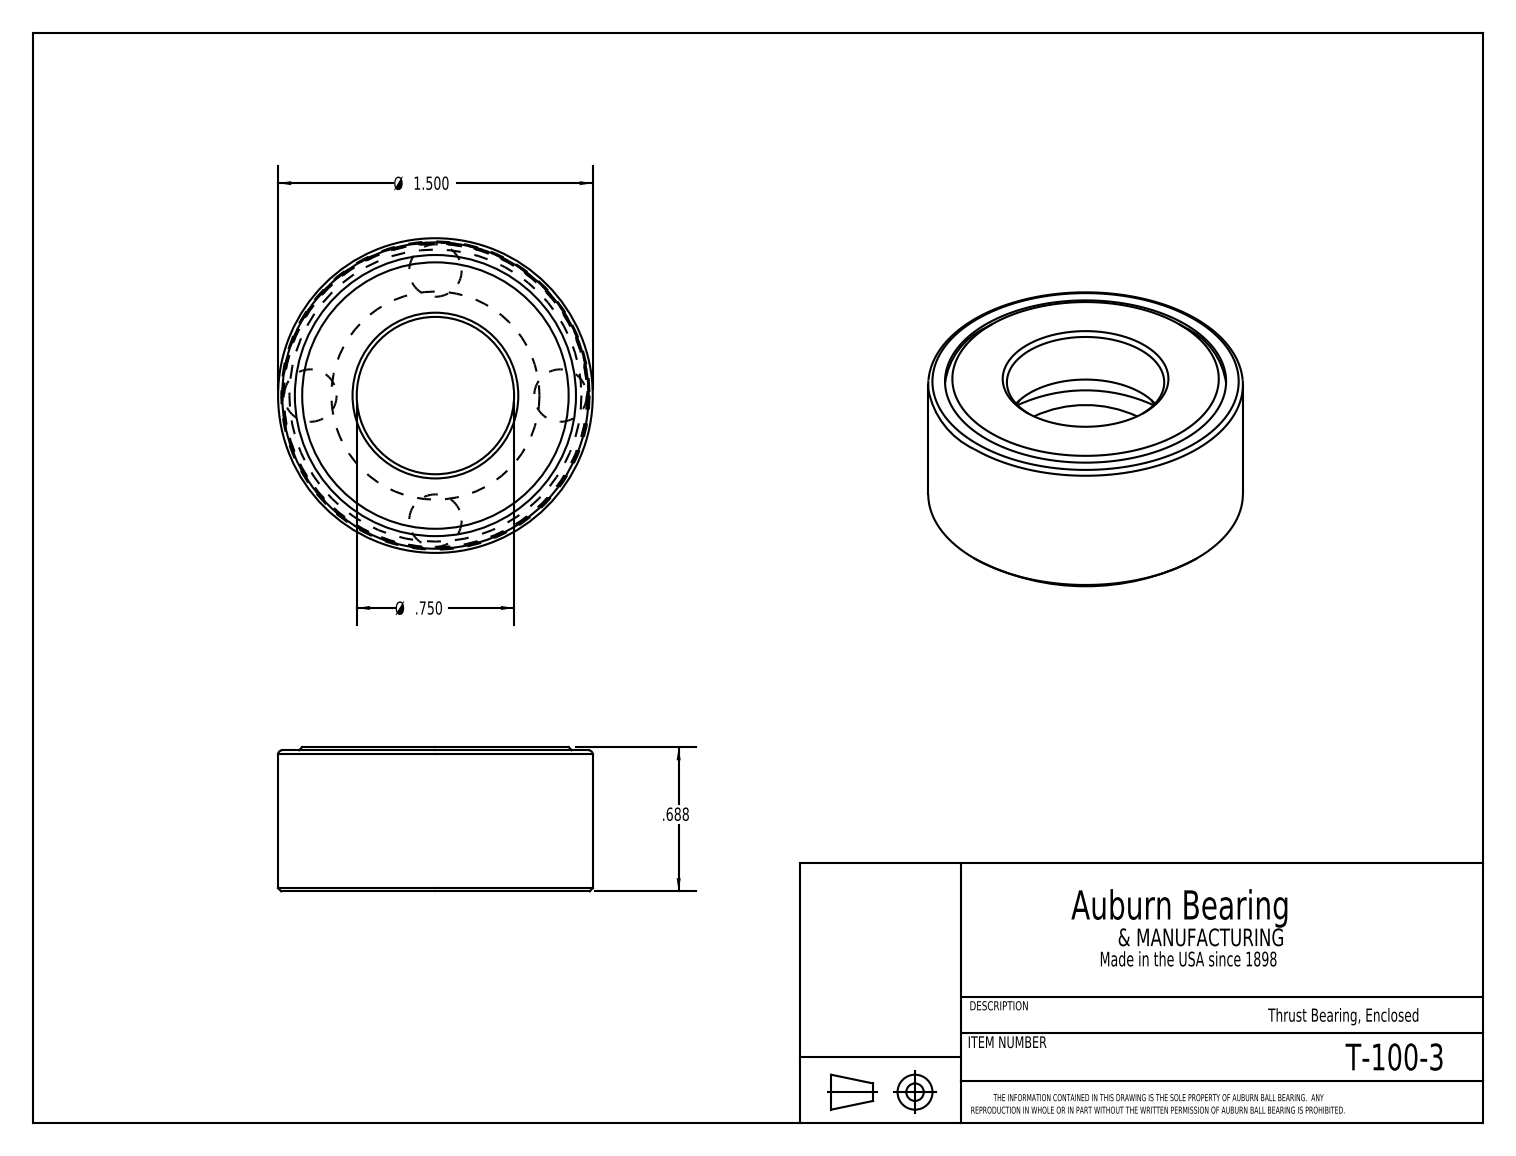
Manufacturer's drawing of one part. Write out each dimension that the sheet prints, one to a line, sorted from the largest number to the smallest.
Ø 1.500
Ø .750
.688
